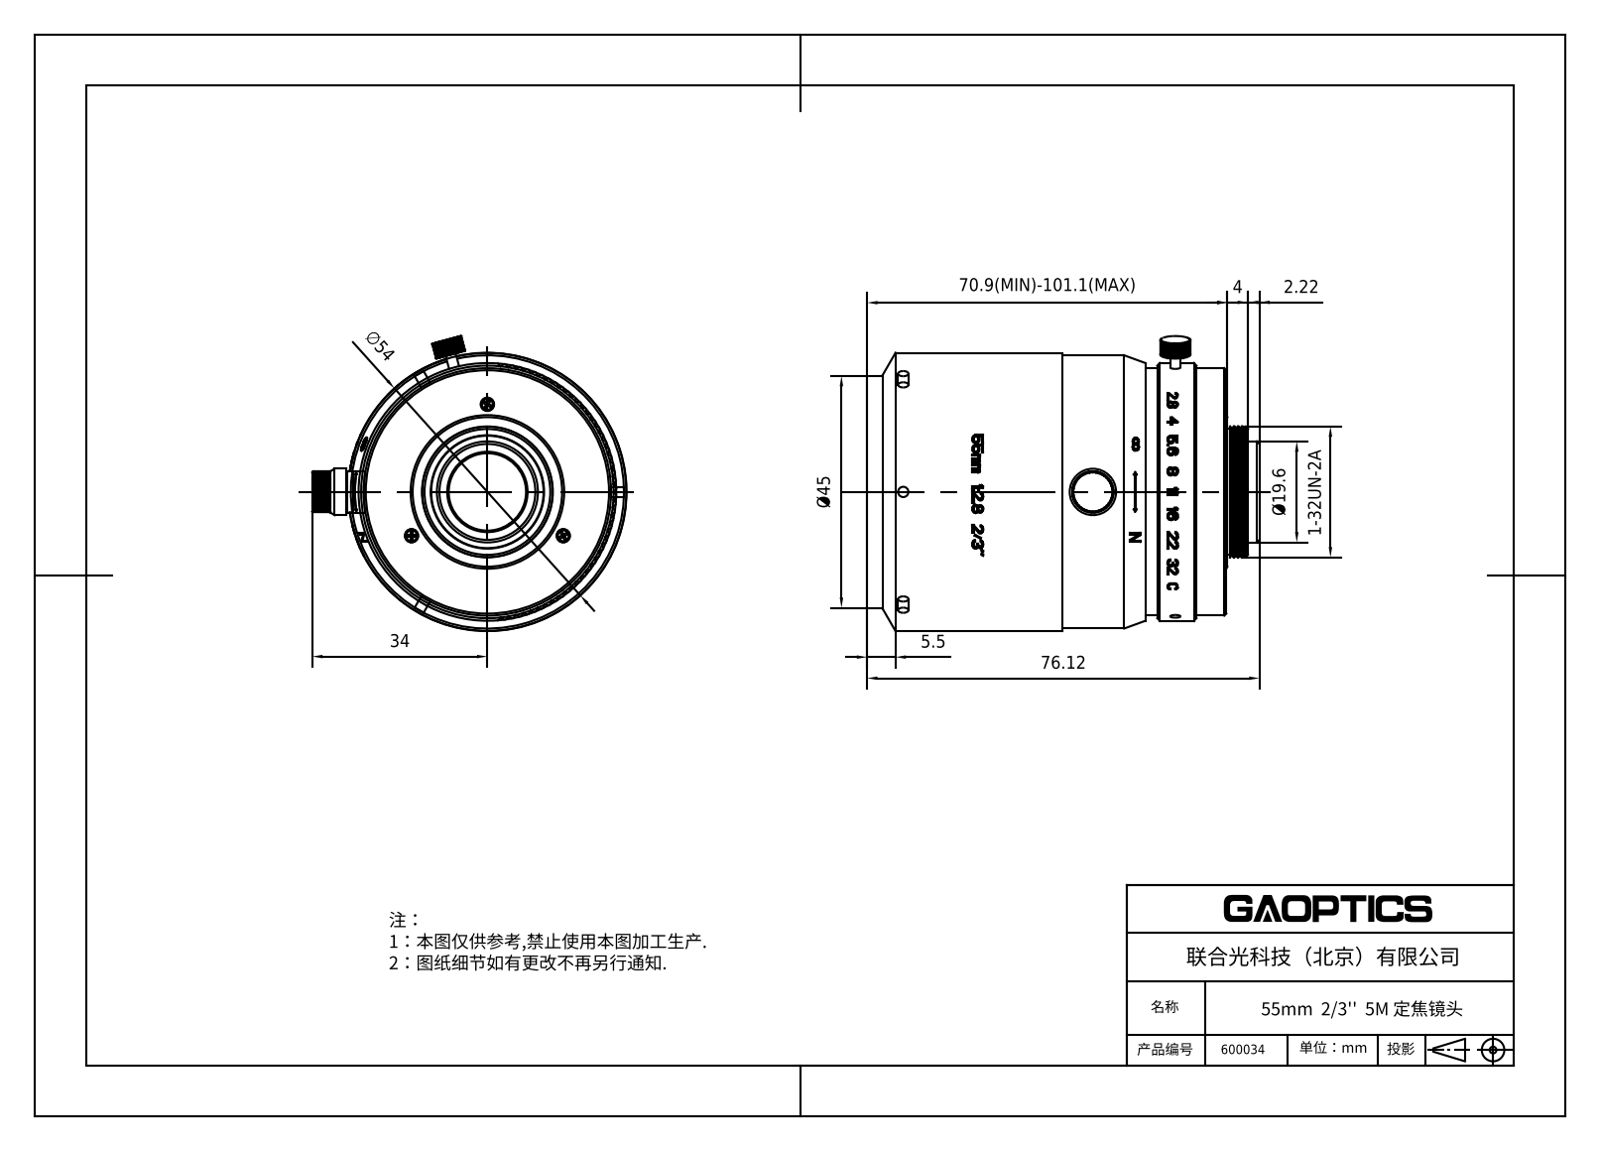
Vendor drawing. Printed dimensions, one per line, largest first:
76.12
70.9(MIN)-101.1(MAX)
∅54
Ø45
34
Ø19.6
5.5
4
2.22
1-32UN-2A
